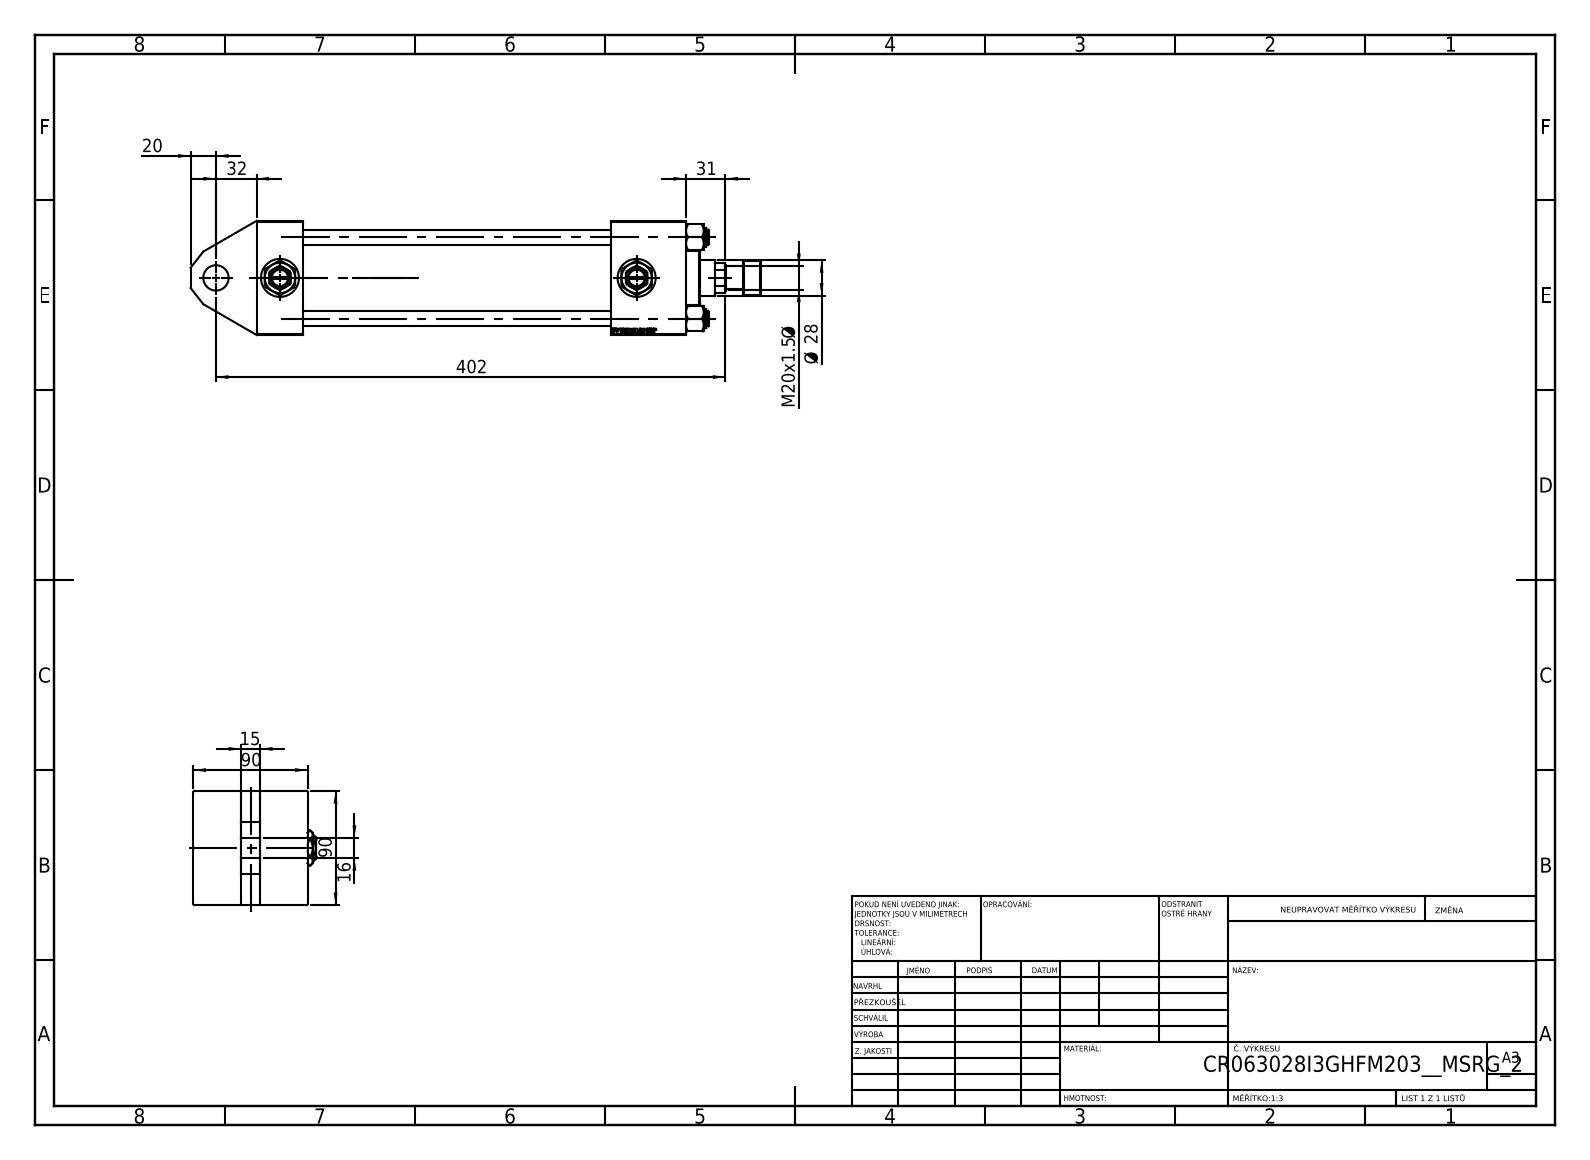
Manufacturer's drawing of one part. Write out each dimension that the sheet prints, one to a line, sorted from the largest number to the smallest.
402
90
90
32
31
Ø 28
M20x1.5 Ø
20
16
15
